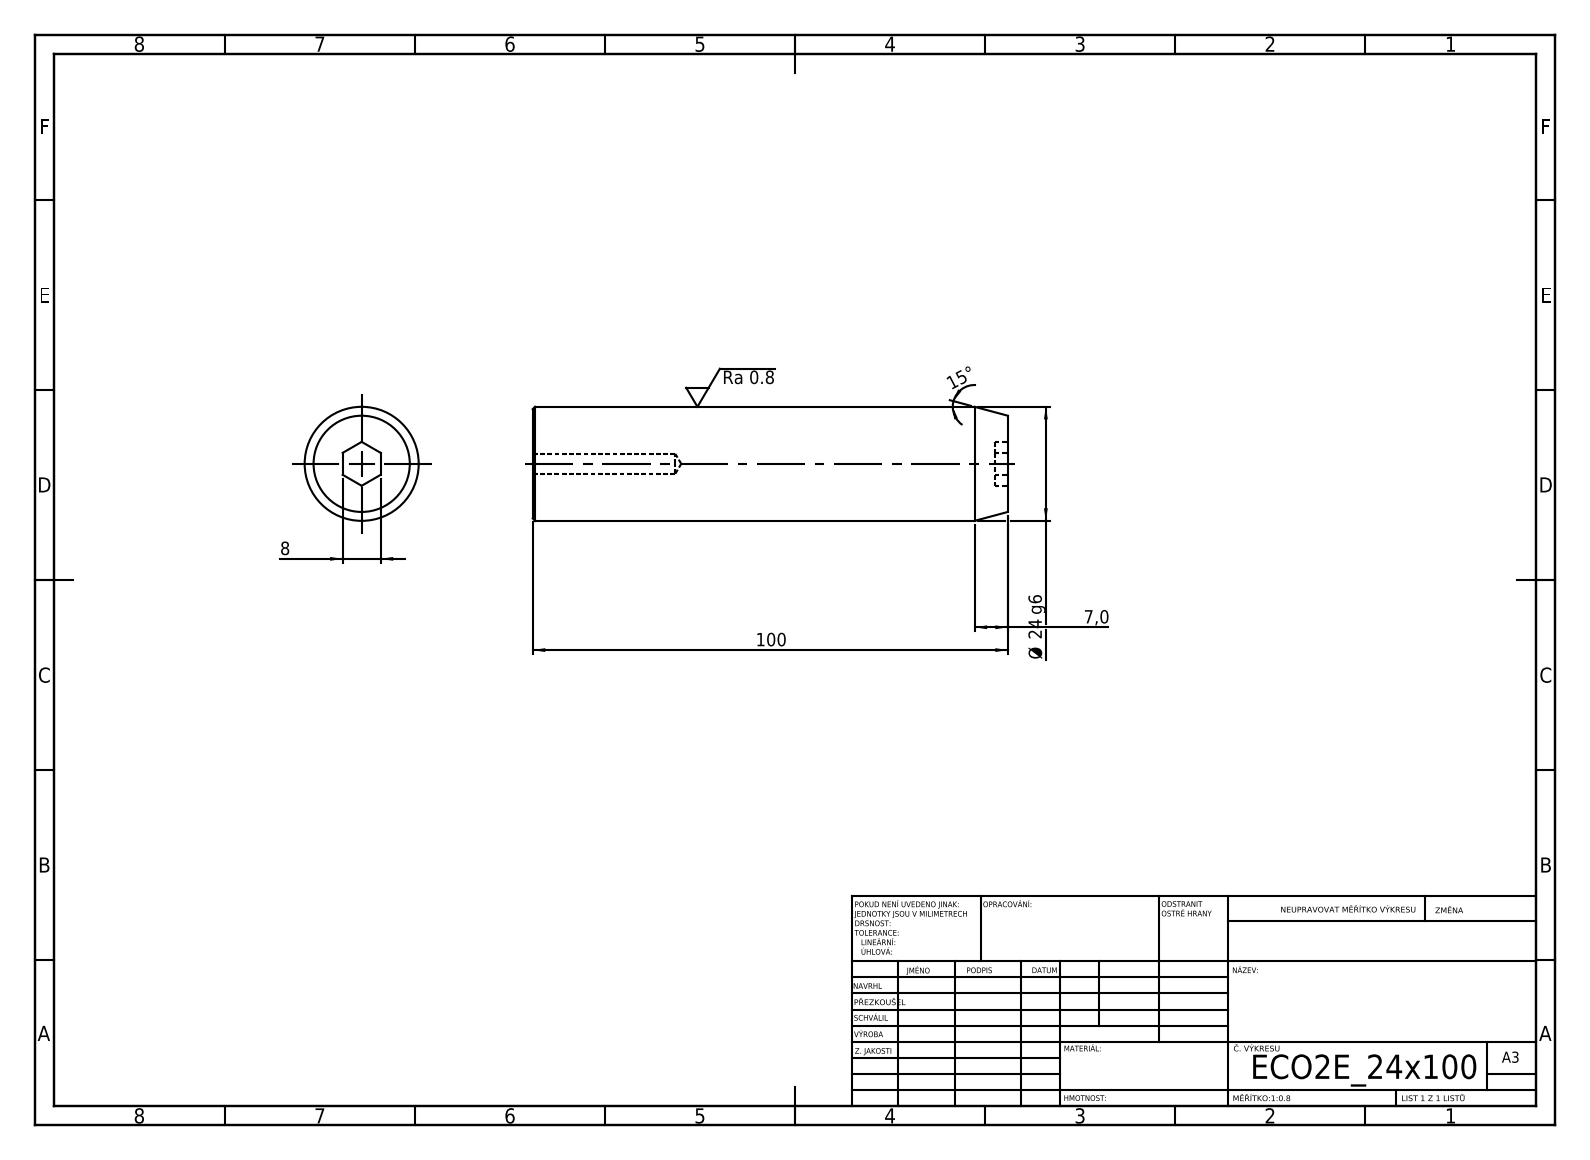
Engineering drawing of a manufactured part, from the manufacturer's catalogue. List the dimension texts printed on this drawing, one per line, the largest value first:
100
Ø 24 g6
15°
8
7,0
